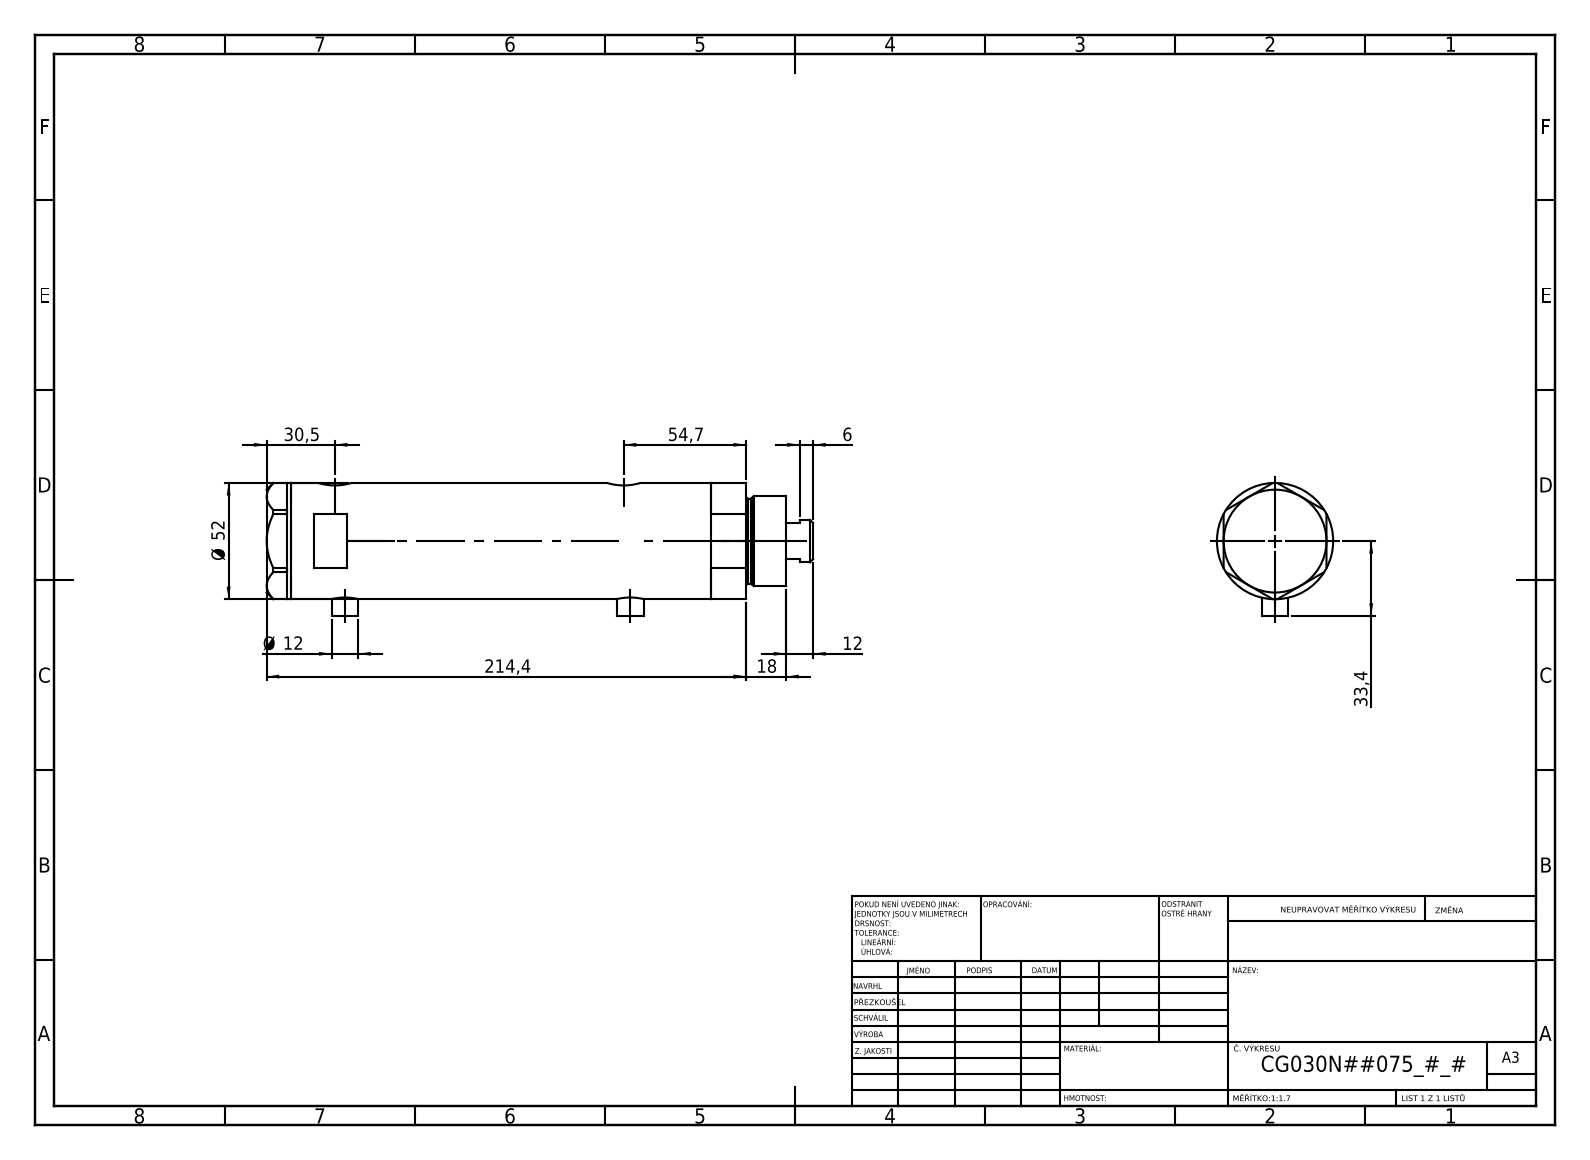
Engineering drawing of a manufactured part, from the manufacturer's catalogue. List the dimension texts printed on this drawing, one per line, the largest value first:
214,4
54,7
Ø 52
33,4
30,5
18
12
Ø 12
6
